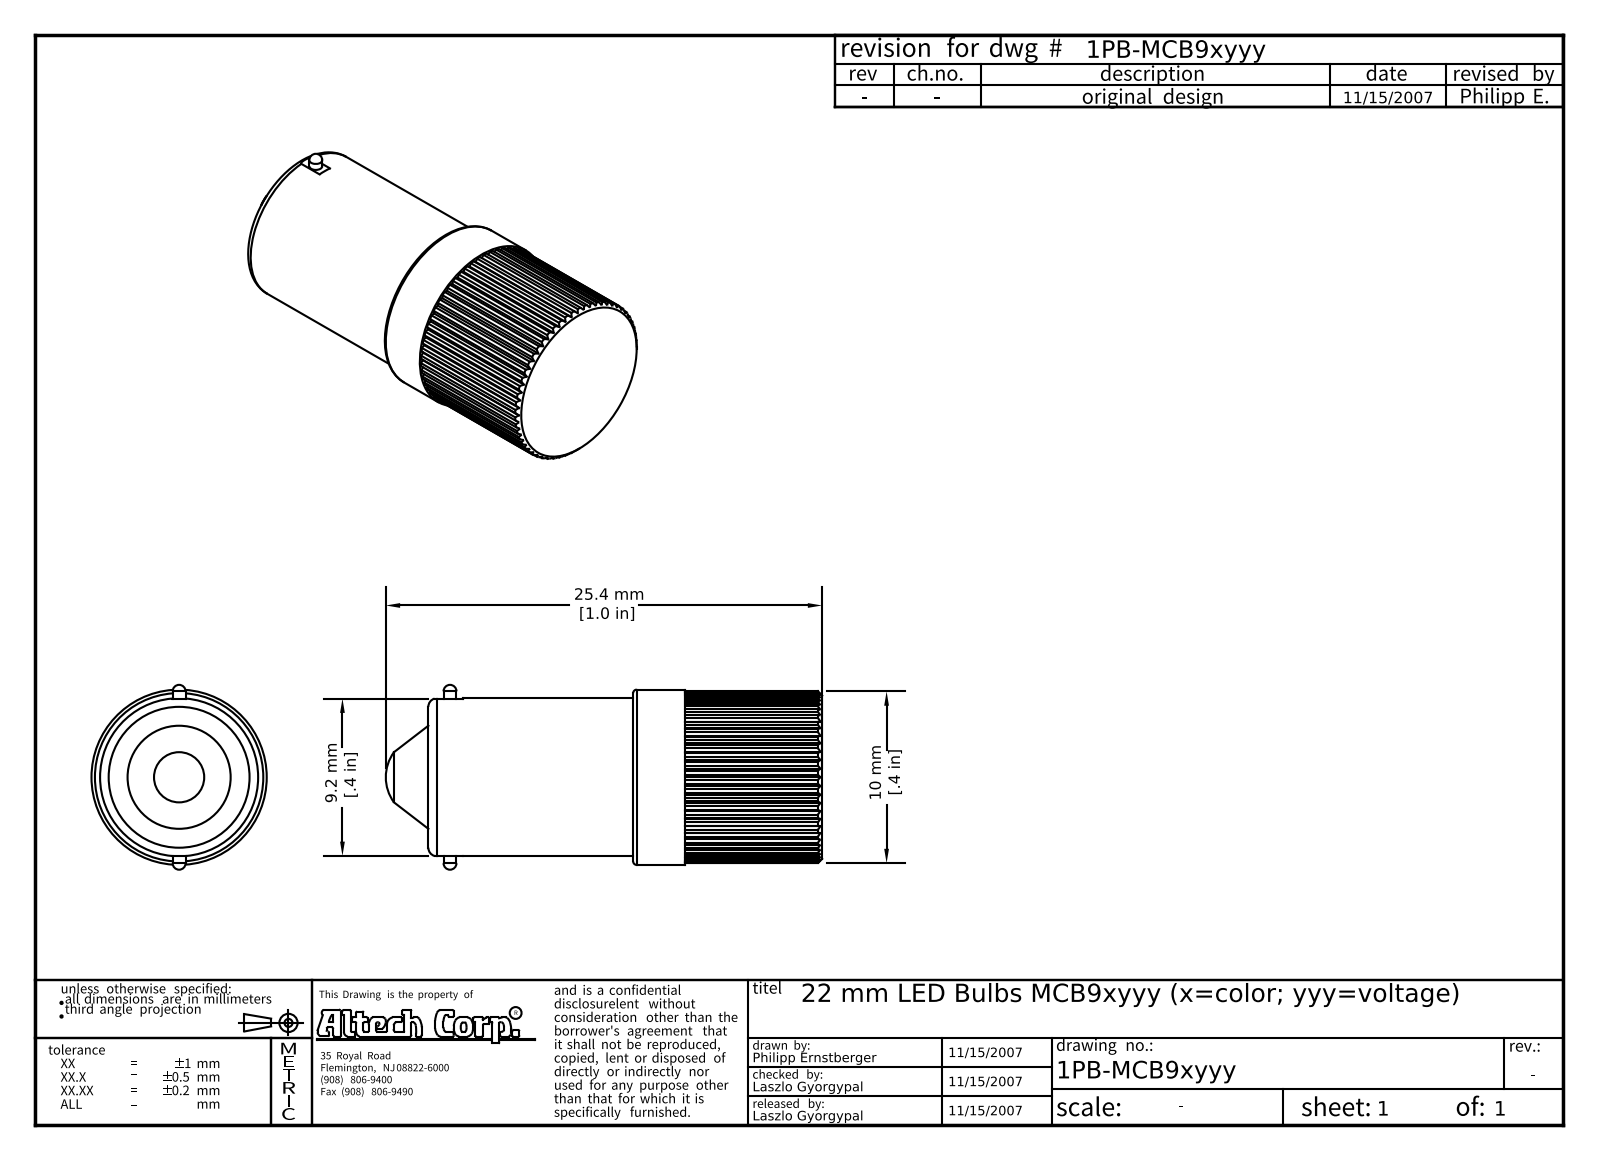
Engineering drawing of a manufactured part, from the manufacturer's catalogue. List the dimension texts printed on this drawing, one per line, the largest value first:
25.4 mm [1.0 in]
10 mm [.4 in]
9.2 mm [.4 in]
